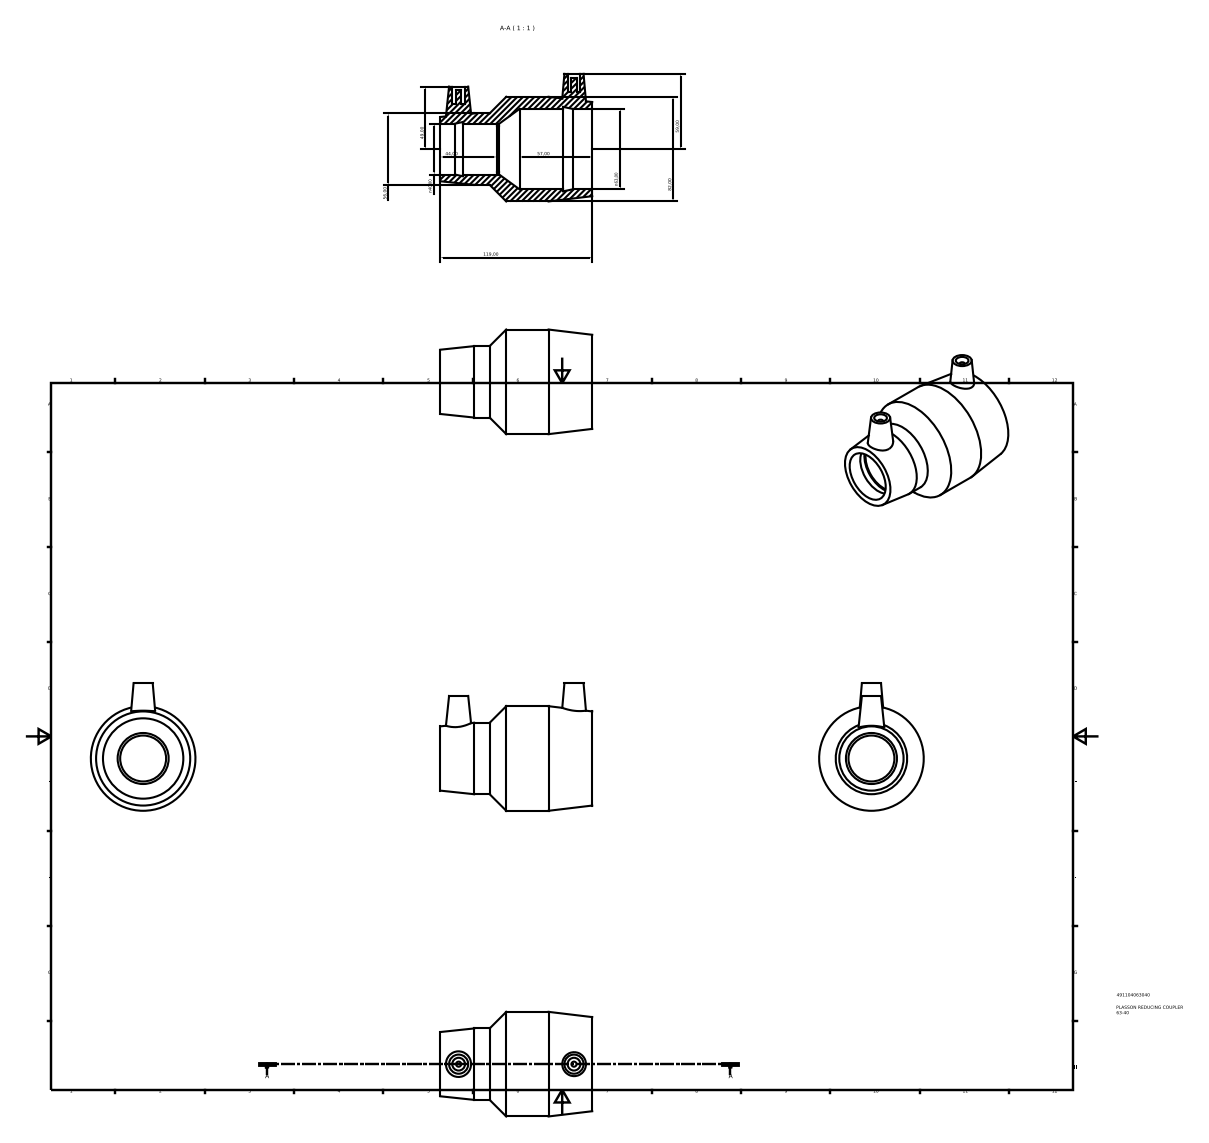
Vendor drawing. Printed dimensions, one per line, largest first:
119,00
82,00
n63,00
59,00
57,00
56,00
49,00
44,00
n40,00
